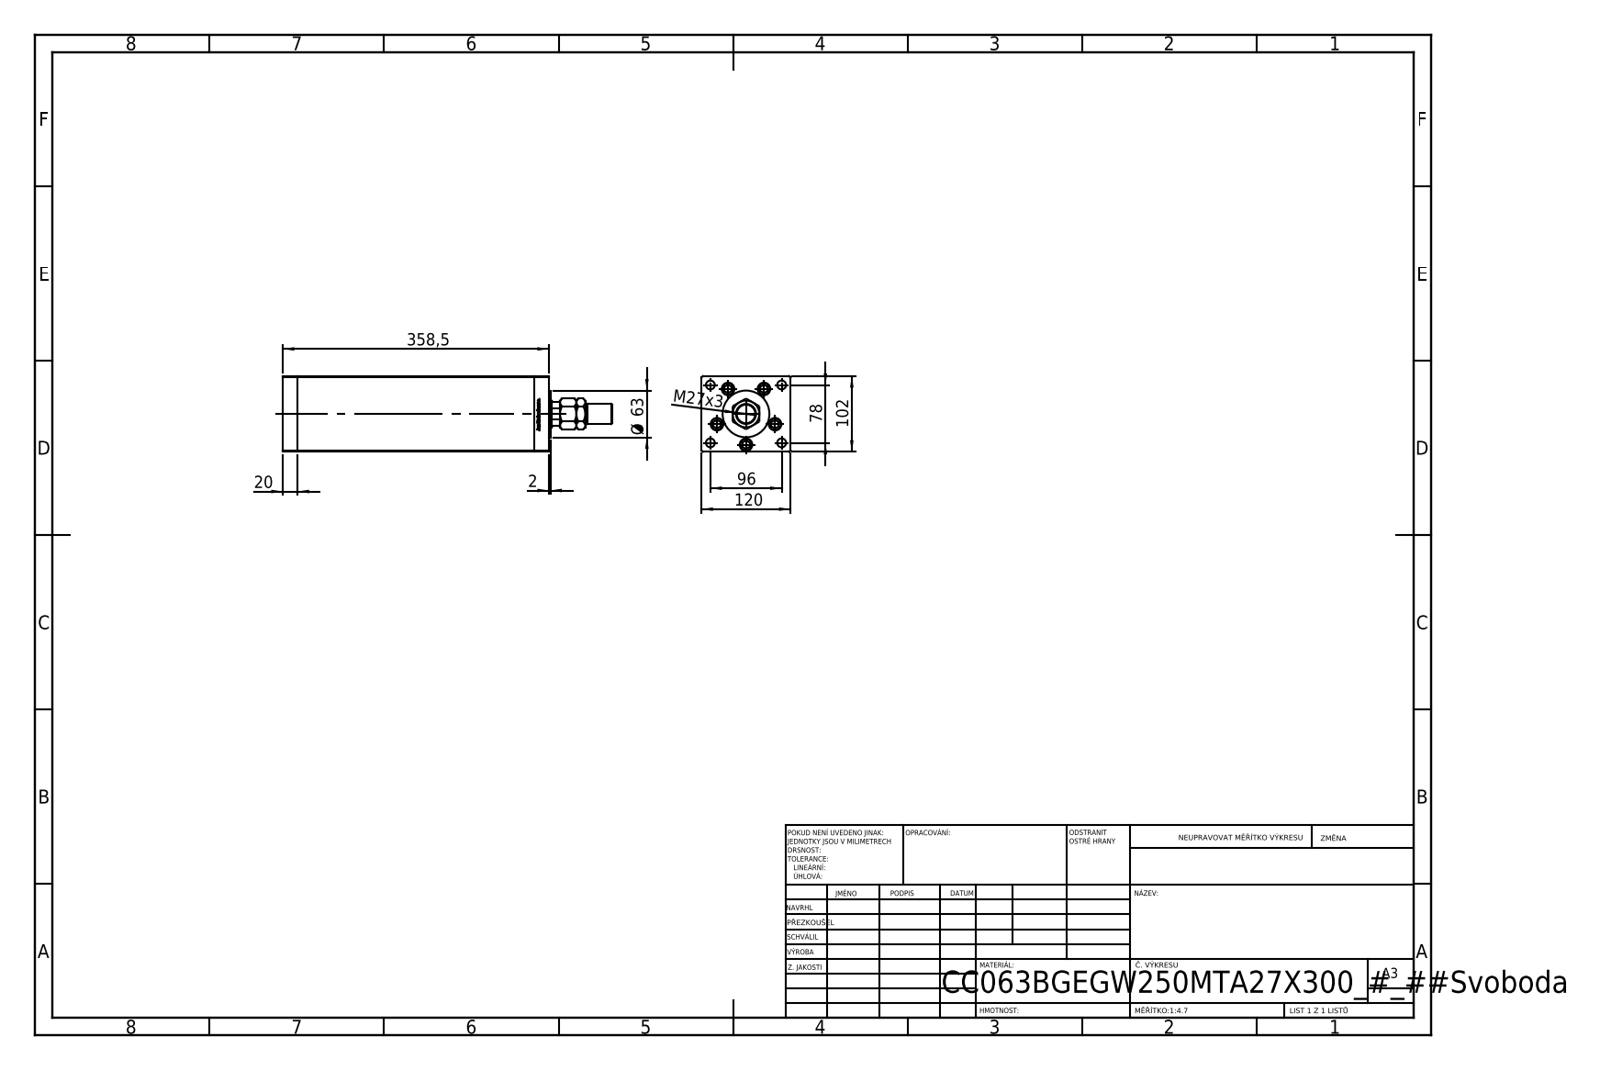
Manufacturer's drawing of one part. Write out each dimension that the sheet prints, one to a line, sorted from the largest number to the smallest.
358,5
120
102
96
78
Ø 63
M27x3
20
2
